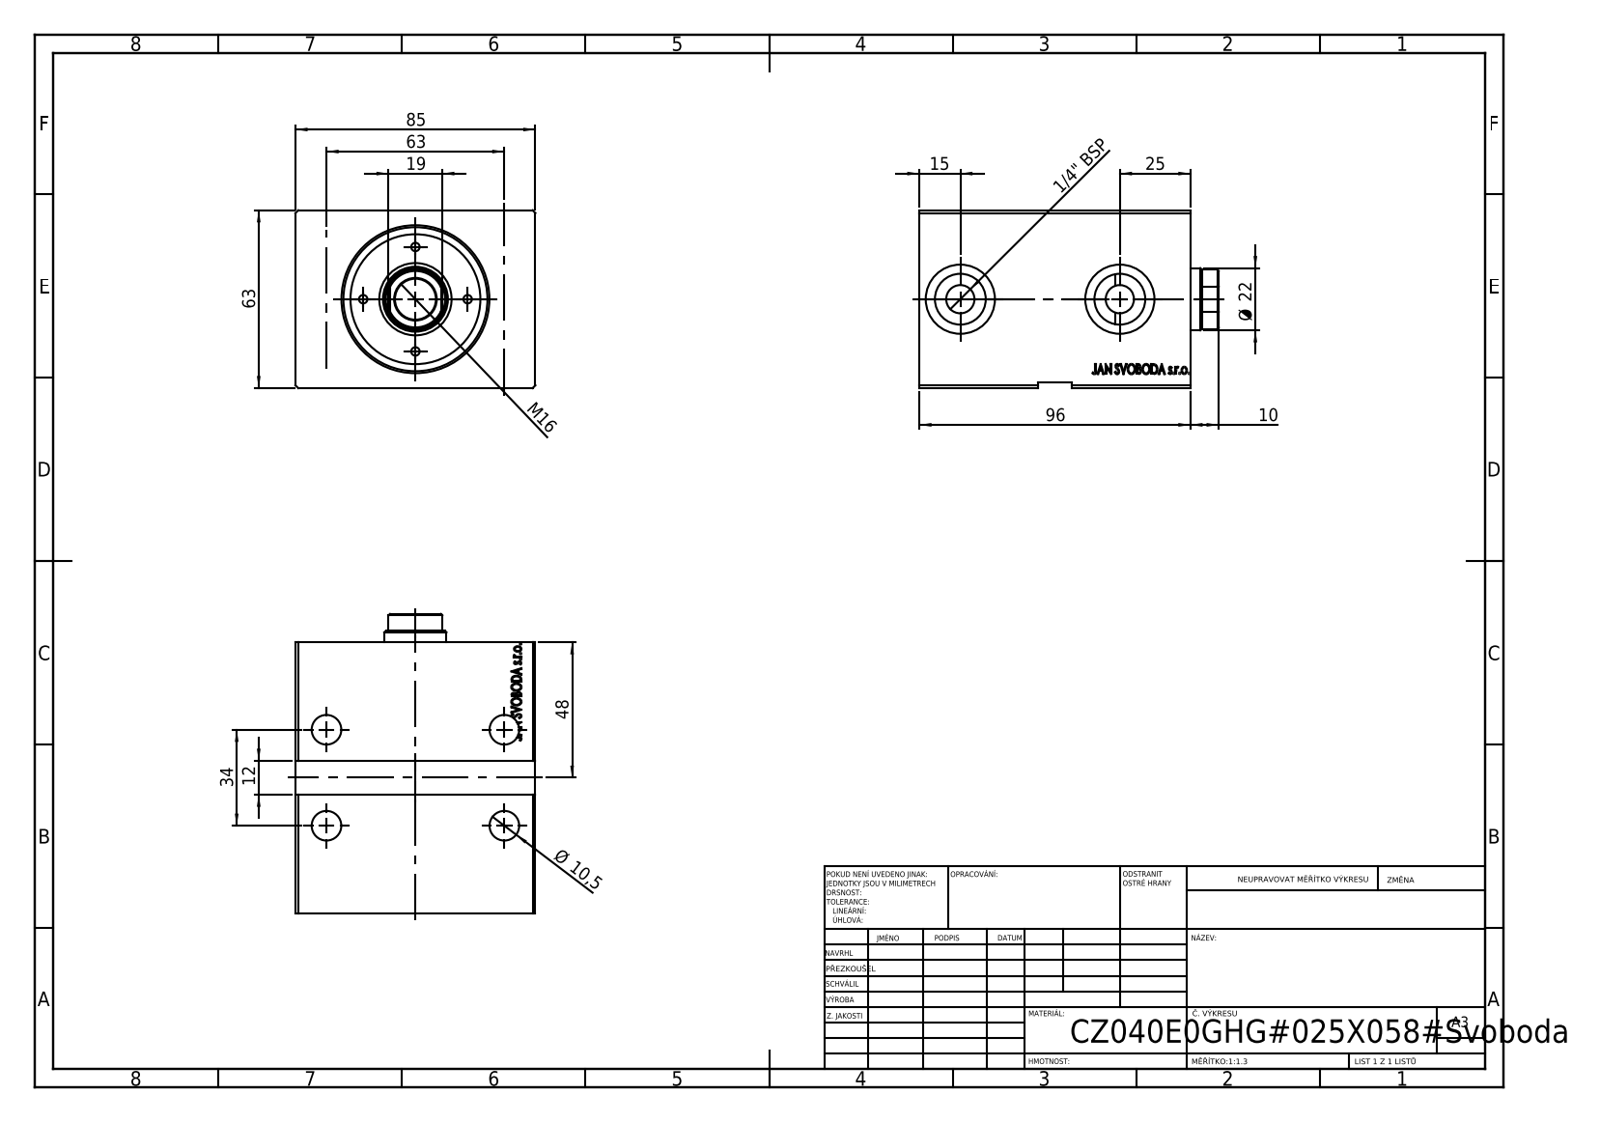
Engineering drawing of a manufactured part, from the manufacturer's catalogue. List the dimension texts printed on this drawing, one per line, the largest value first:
96
85
63
63
48
34
25
Ø 22
19
M16
15
12
Ø 10,5
10
1/4" BSP
